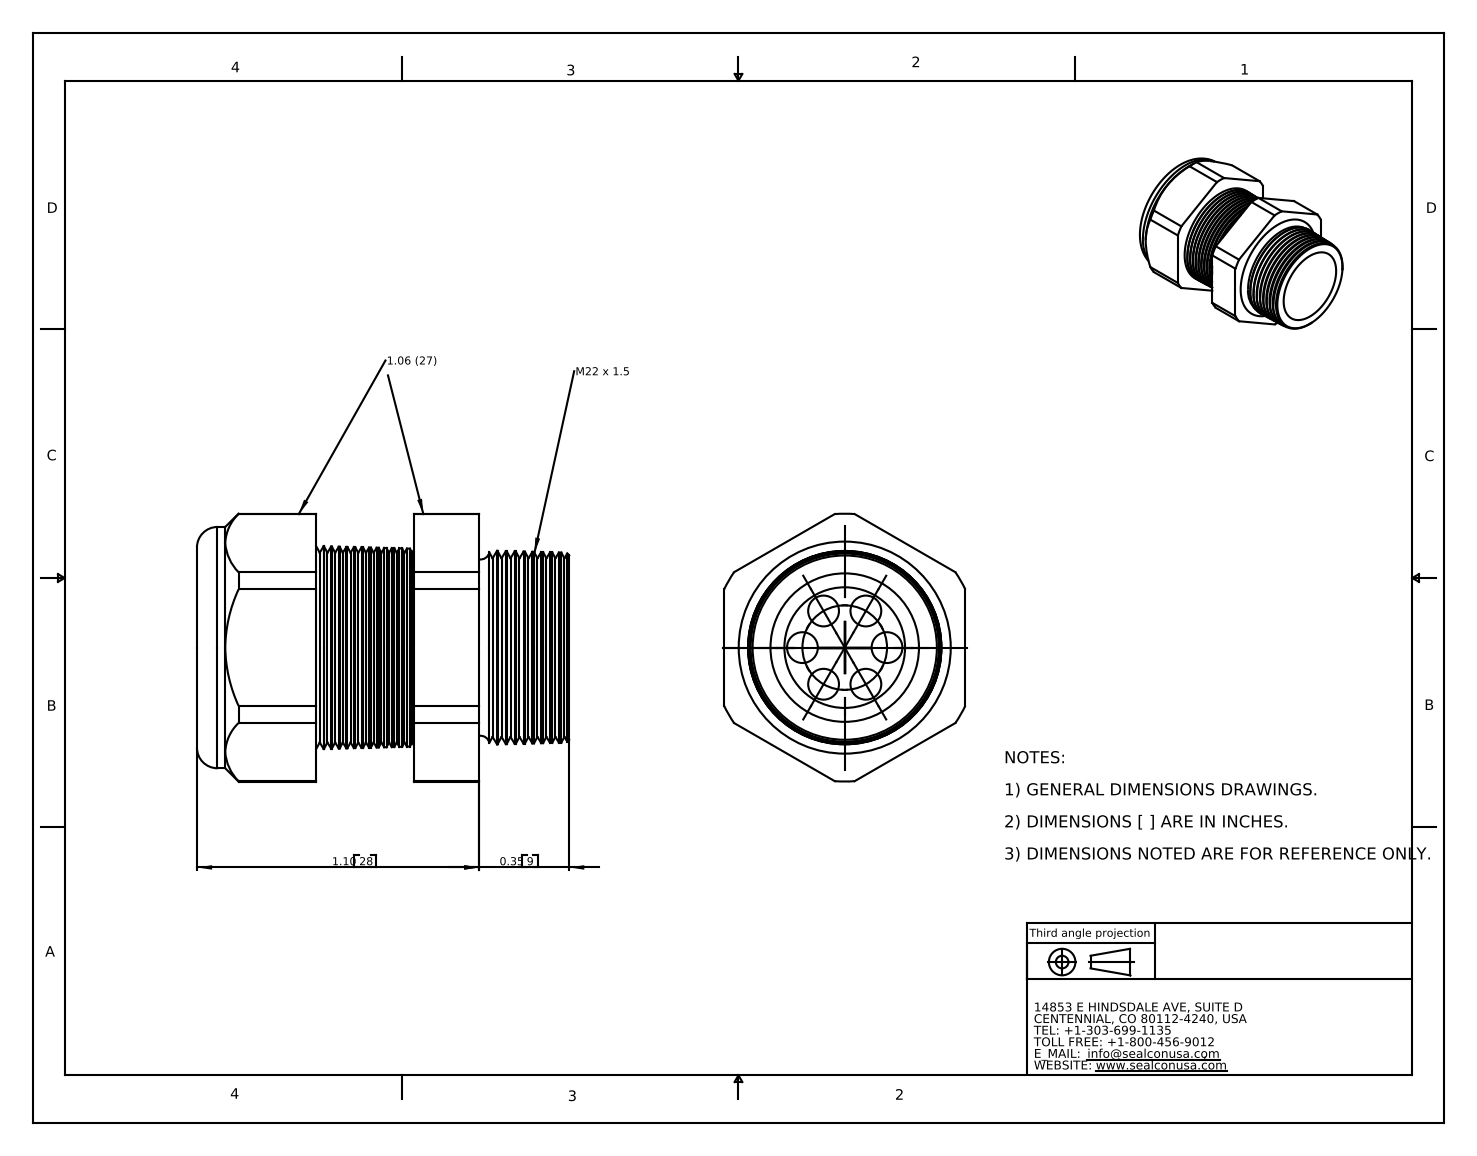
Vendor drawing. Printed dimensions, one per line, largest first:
1.10 28
0.35 9
